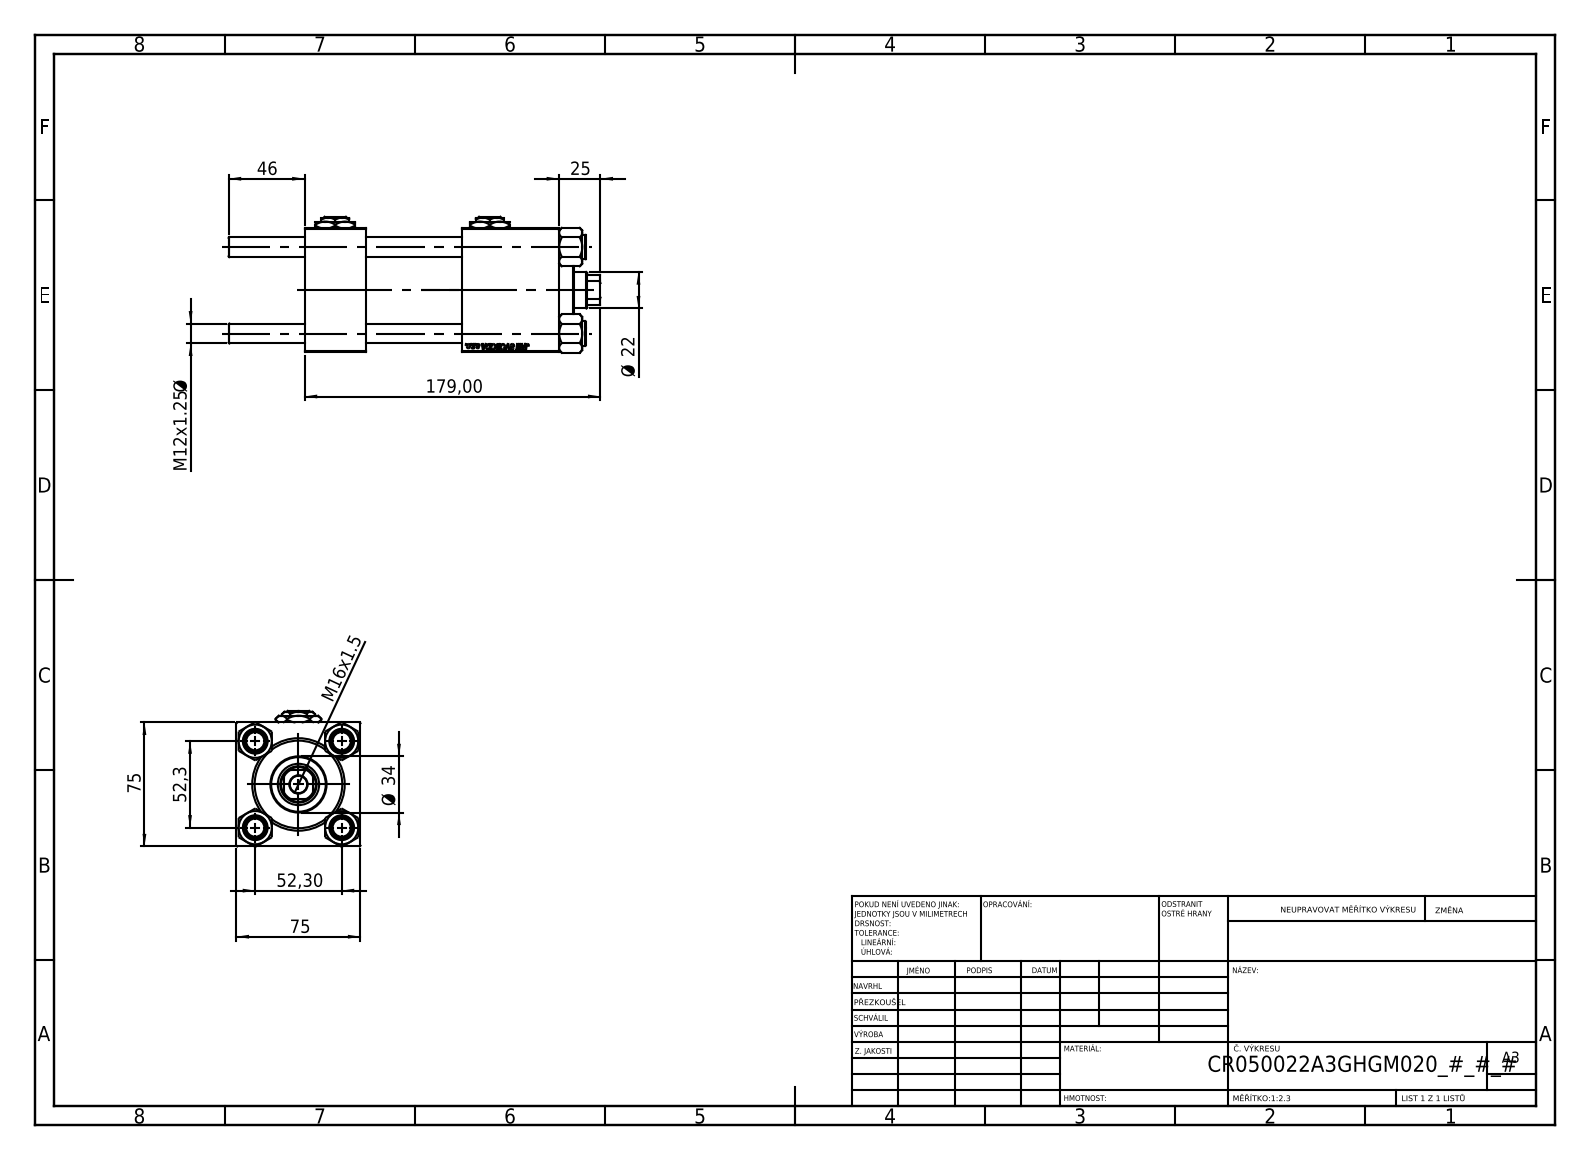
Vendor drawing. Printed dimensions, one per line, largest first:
179,00
75
75
52,3
52,30
46
Ø 34
25
Ø 22
M16x1.5
M12x1.25 Ø
